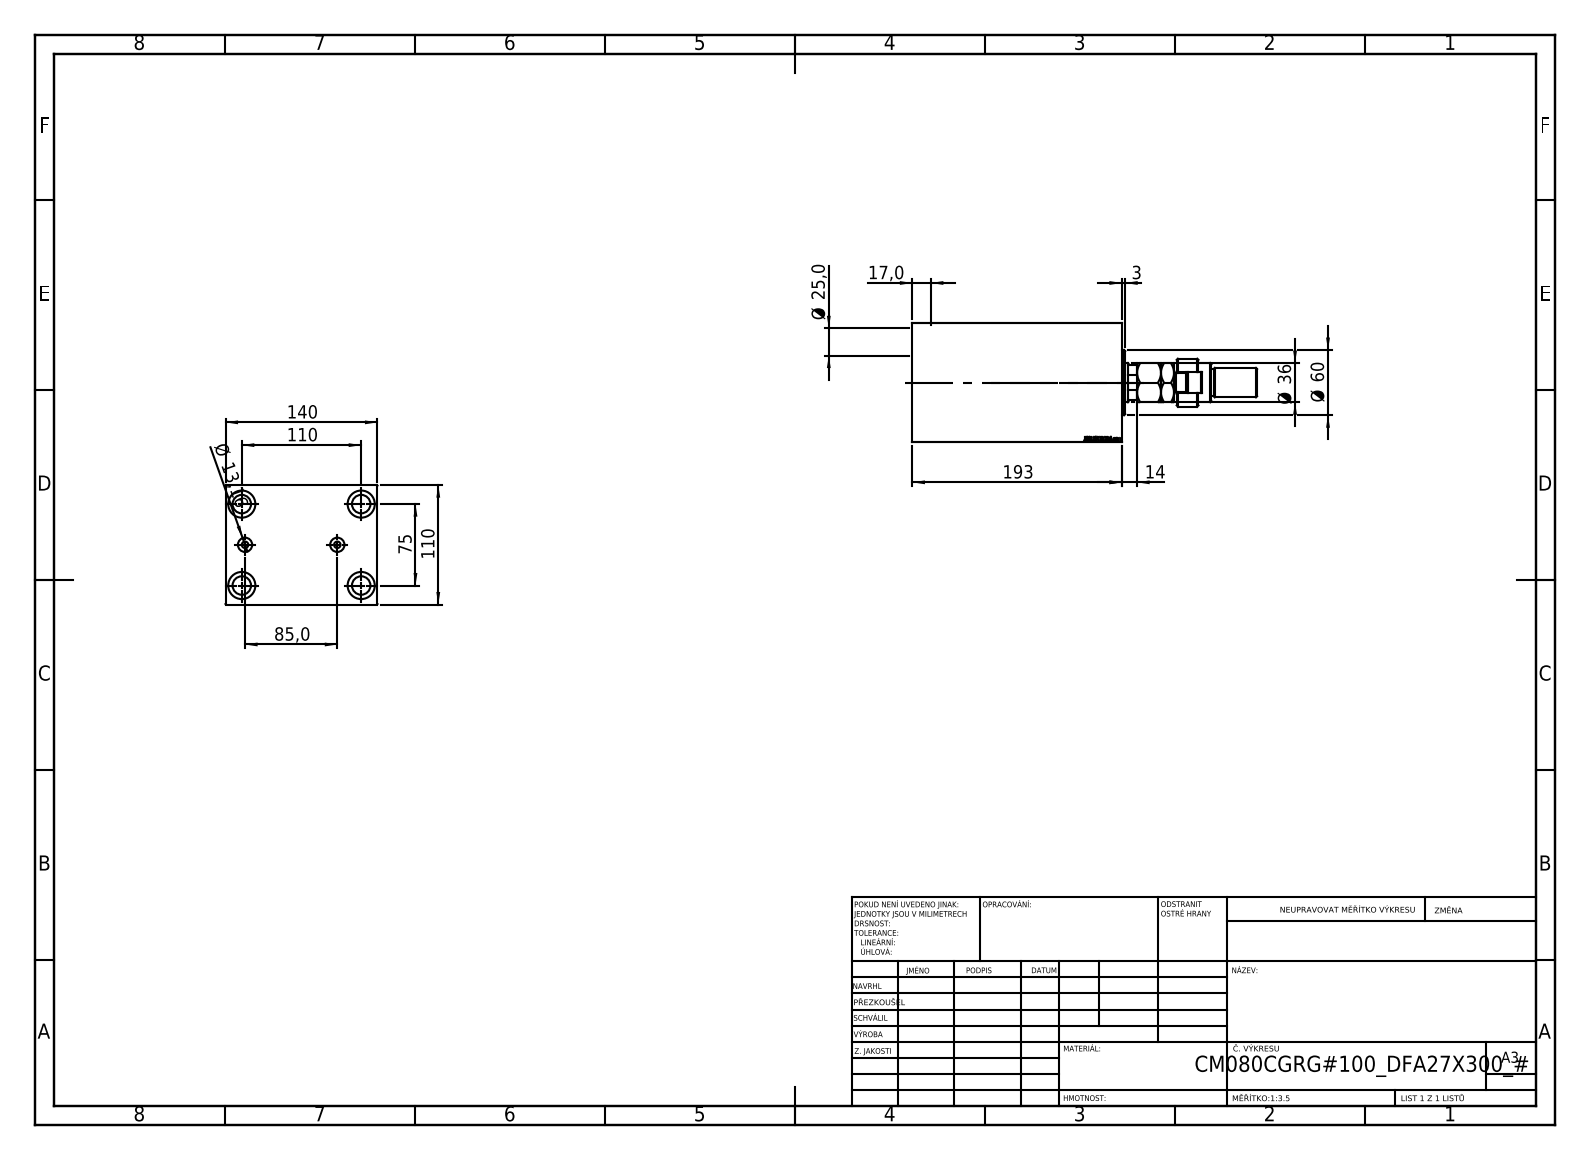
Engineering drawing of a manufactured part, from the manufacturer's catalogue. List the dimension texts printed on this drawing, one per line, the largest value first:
193
140
110
110
85,0
75
Ø 60
Ø 36
Ø 25,0
17,0
14
Ø 13,16
3
